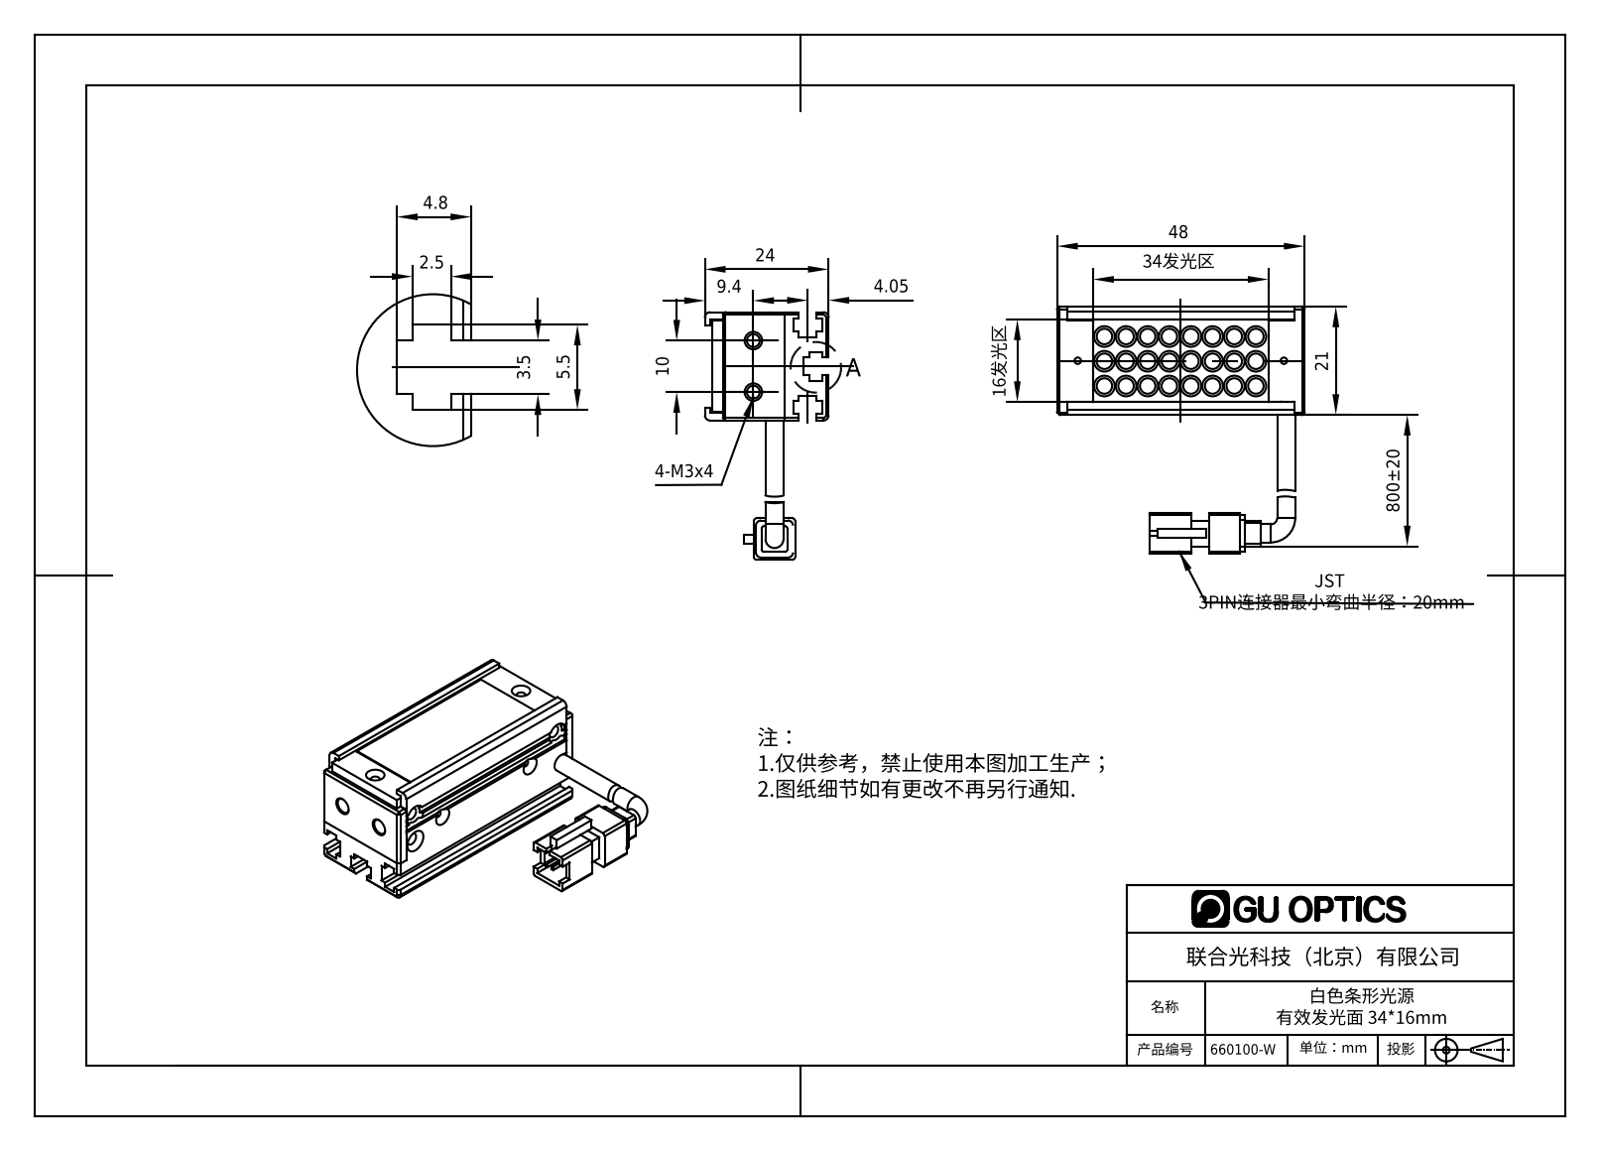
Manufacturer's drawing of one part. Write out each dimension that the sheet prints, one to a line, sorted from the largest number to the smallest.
800±20
48
34发光区
24
21
16发光区
10
9.4
5.5
4.8
4.05
3.5
2.5
